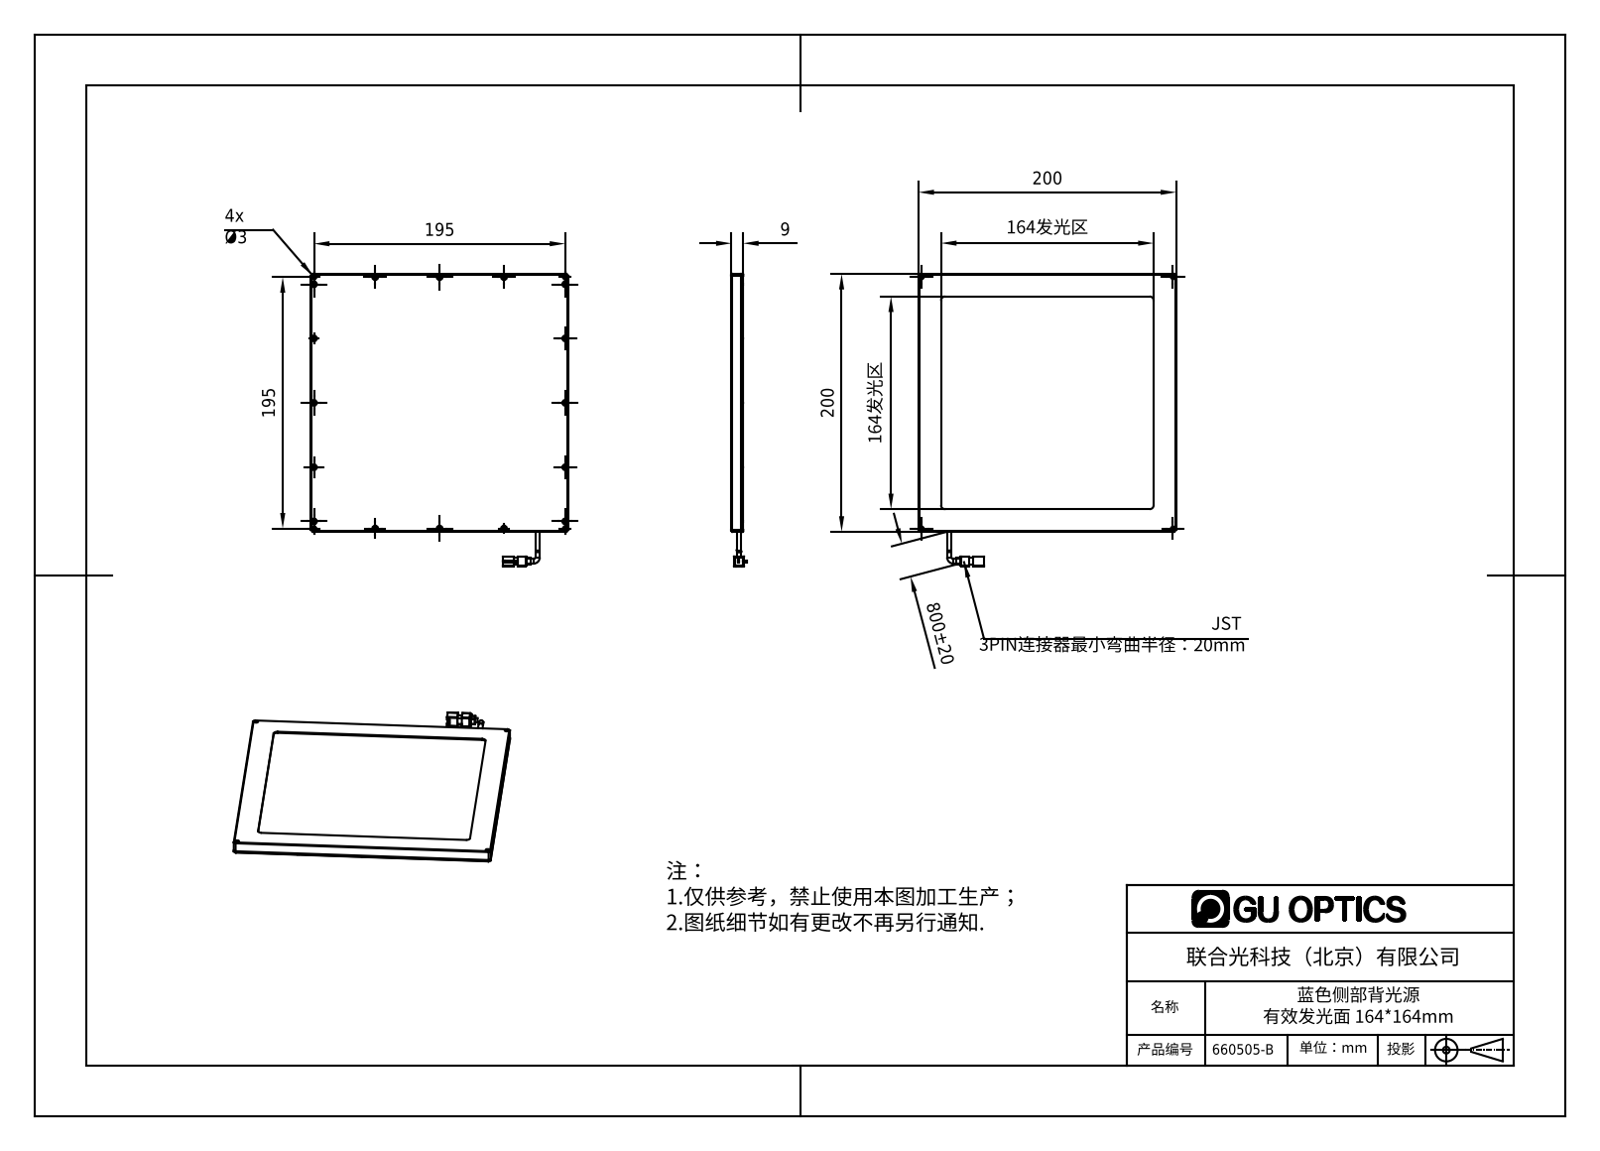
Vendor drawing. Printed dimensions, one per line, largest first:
800±20
200
200
195
195
164发光区
164发光区
9
